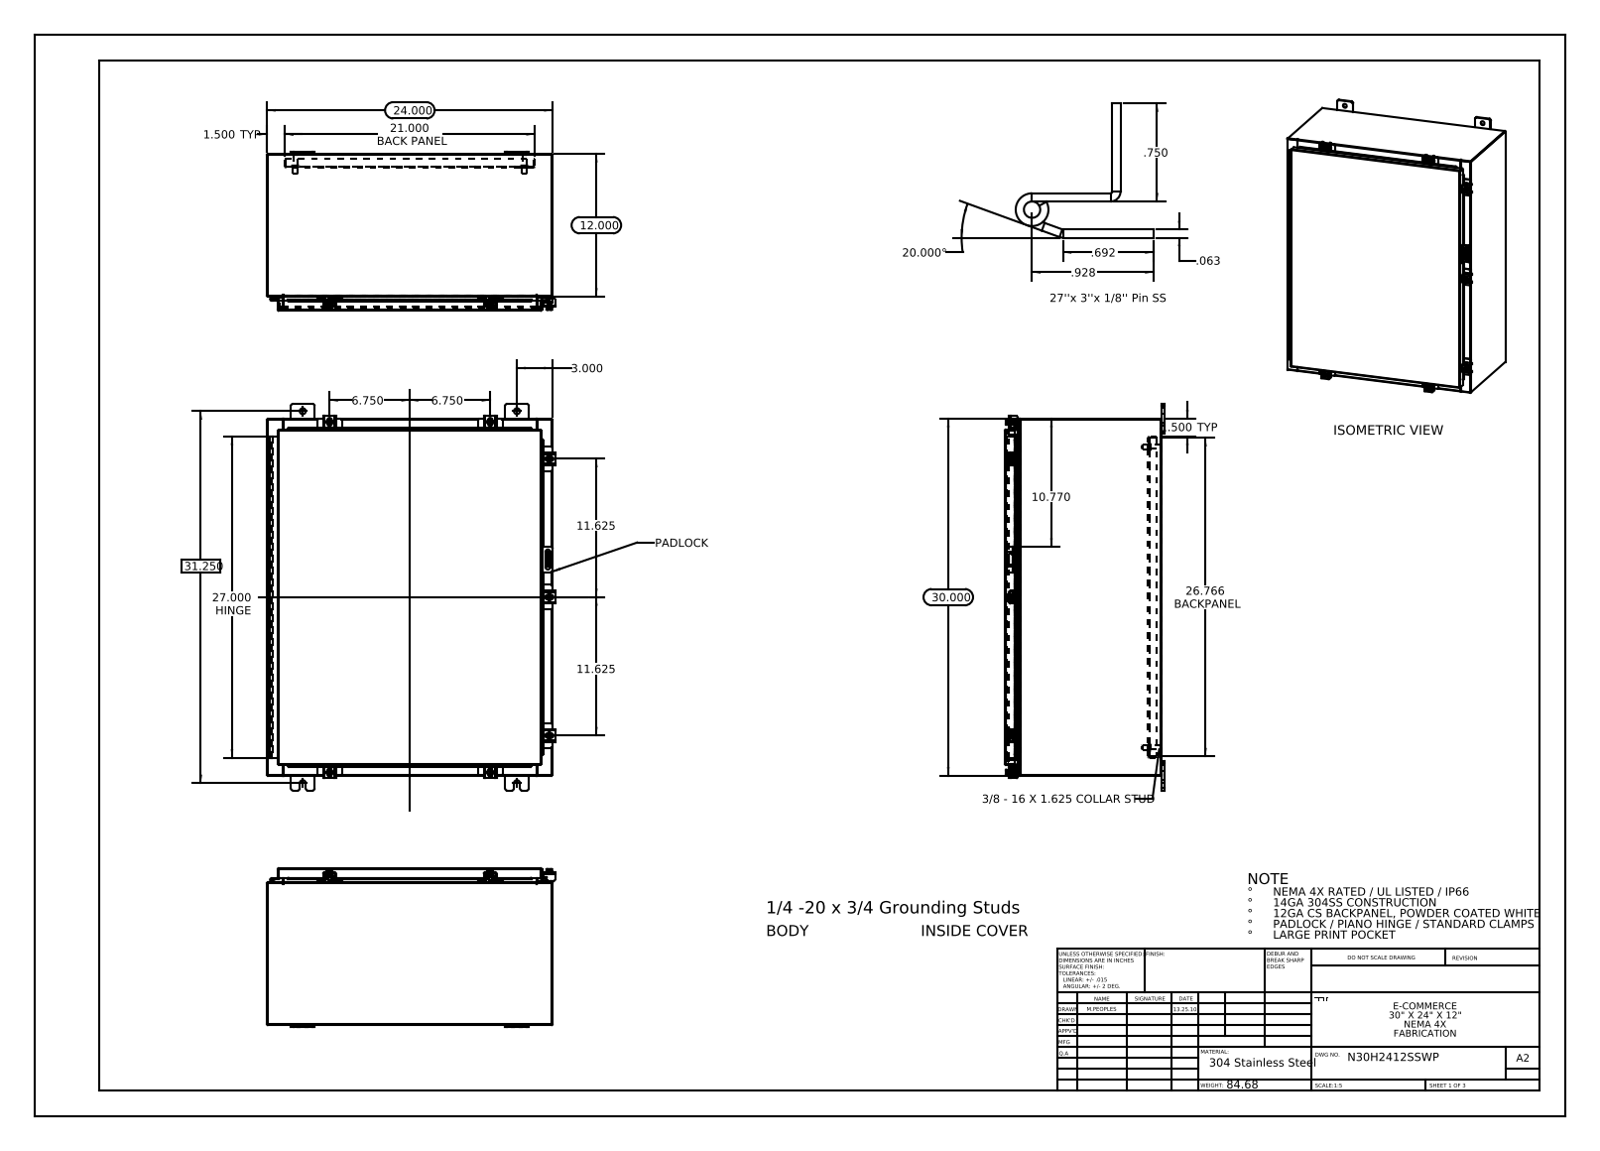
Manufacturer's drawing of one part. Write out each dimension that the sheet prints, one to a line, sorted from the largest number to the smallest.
31.250
30.000
27.000 HINGE
26.766 BACKPANEL
24.000
21.000 BACK PANEL
20.000°
12.000
11.625
11.625
10.770
6.750
6.750
3.000
1.500 TYP
1.500 TYP
.928
.750
.692
.063
